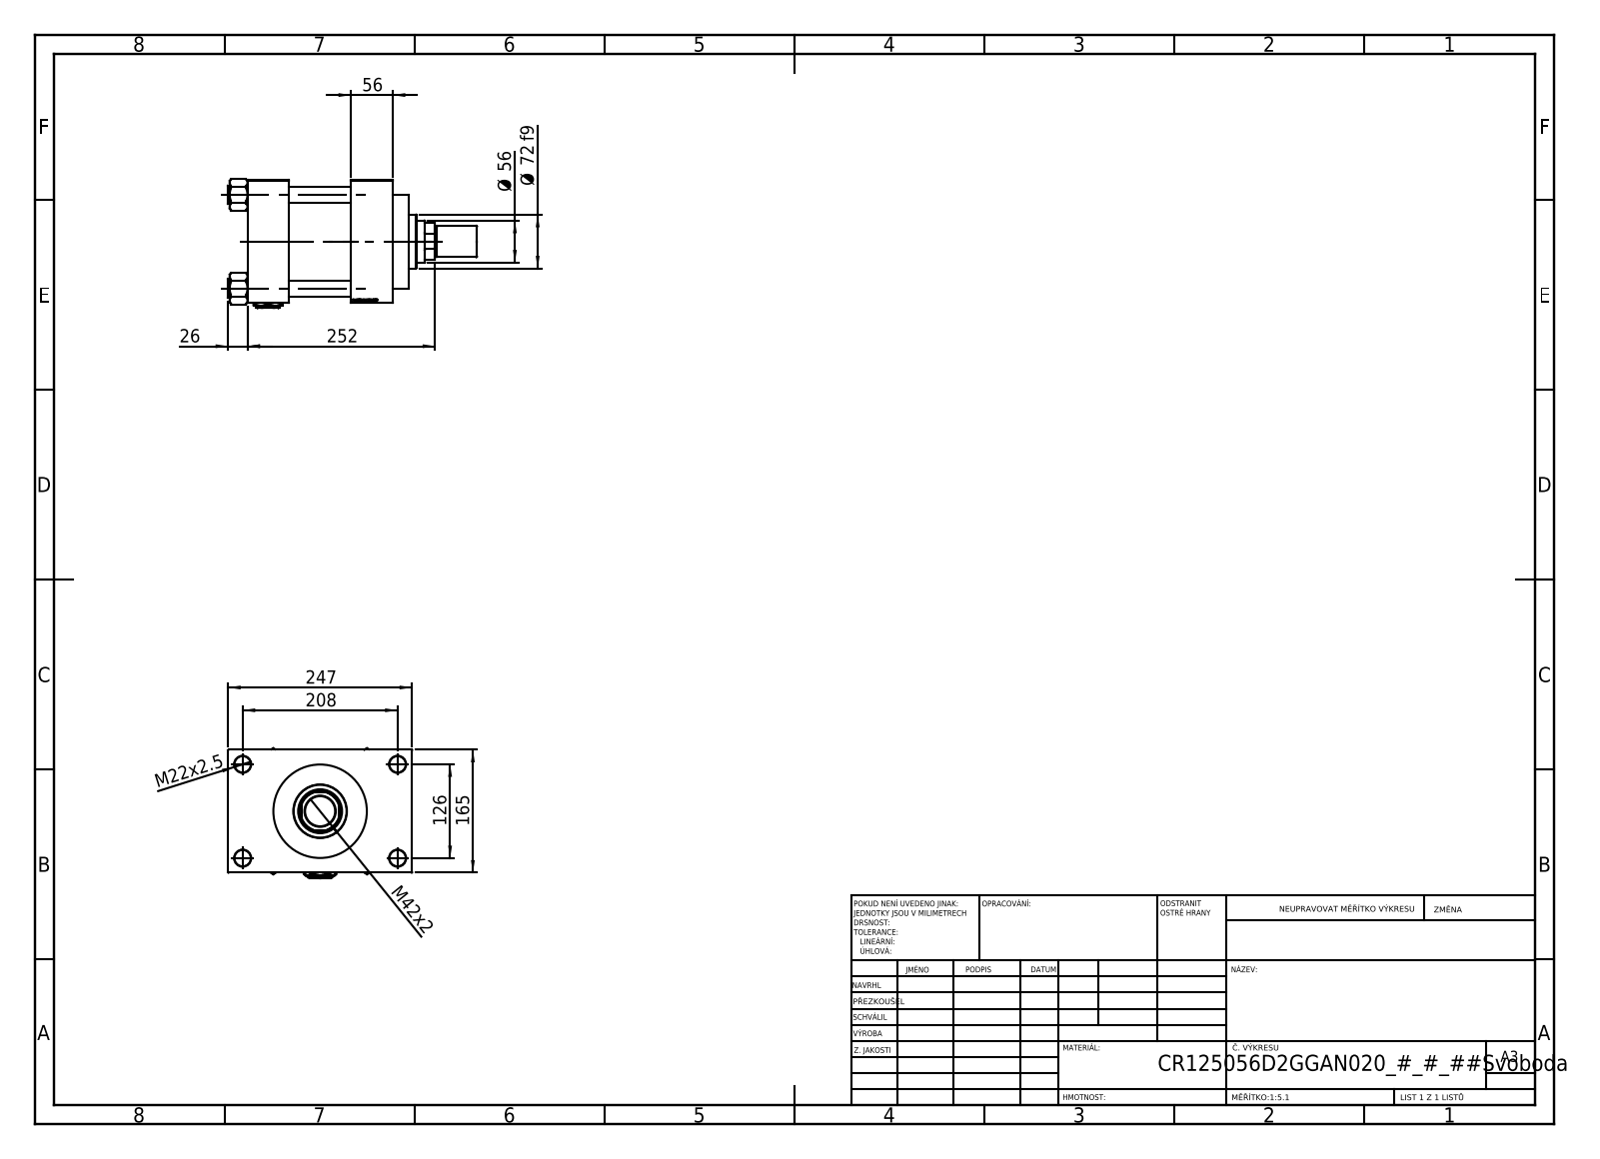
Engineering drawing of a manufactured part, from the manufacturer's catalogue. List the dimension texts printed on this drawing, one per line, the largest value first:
252
247
208
165
126
Ø 72 f9
56
Ø 56
M42x2
26
M22x2.5
